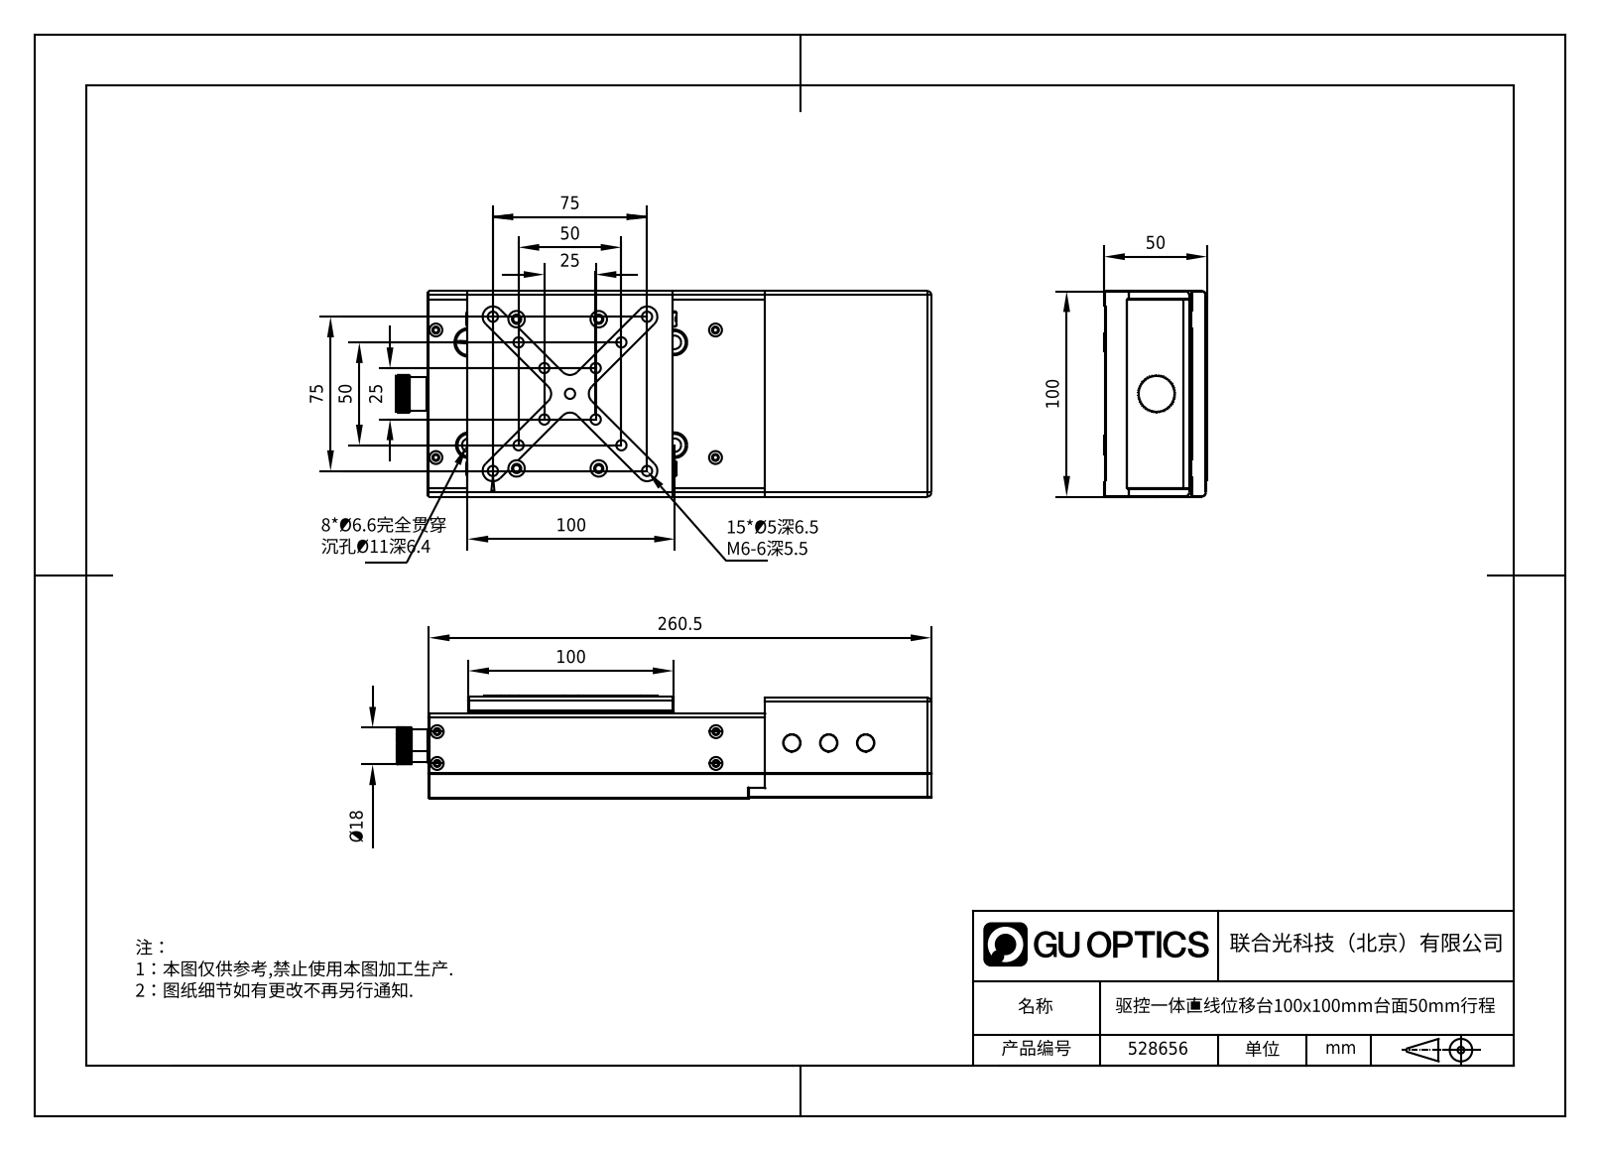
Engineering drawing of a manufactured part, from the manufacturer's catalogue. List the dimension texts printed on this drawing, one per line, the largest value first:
260.5
100
100
100
75
75
50
50
50
25
25
Ø18
